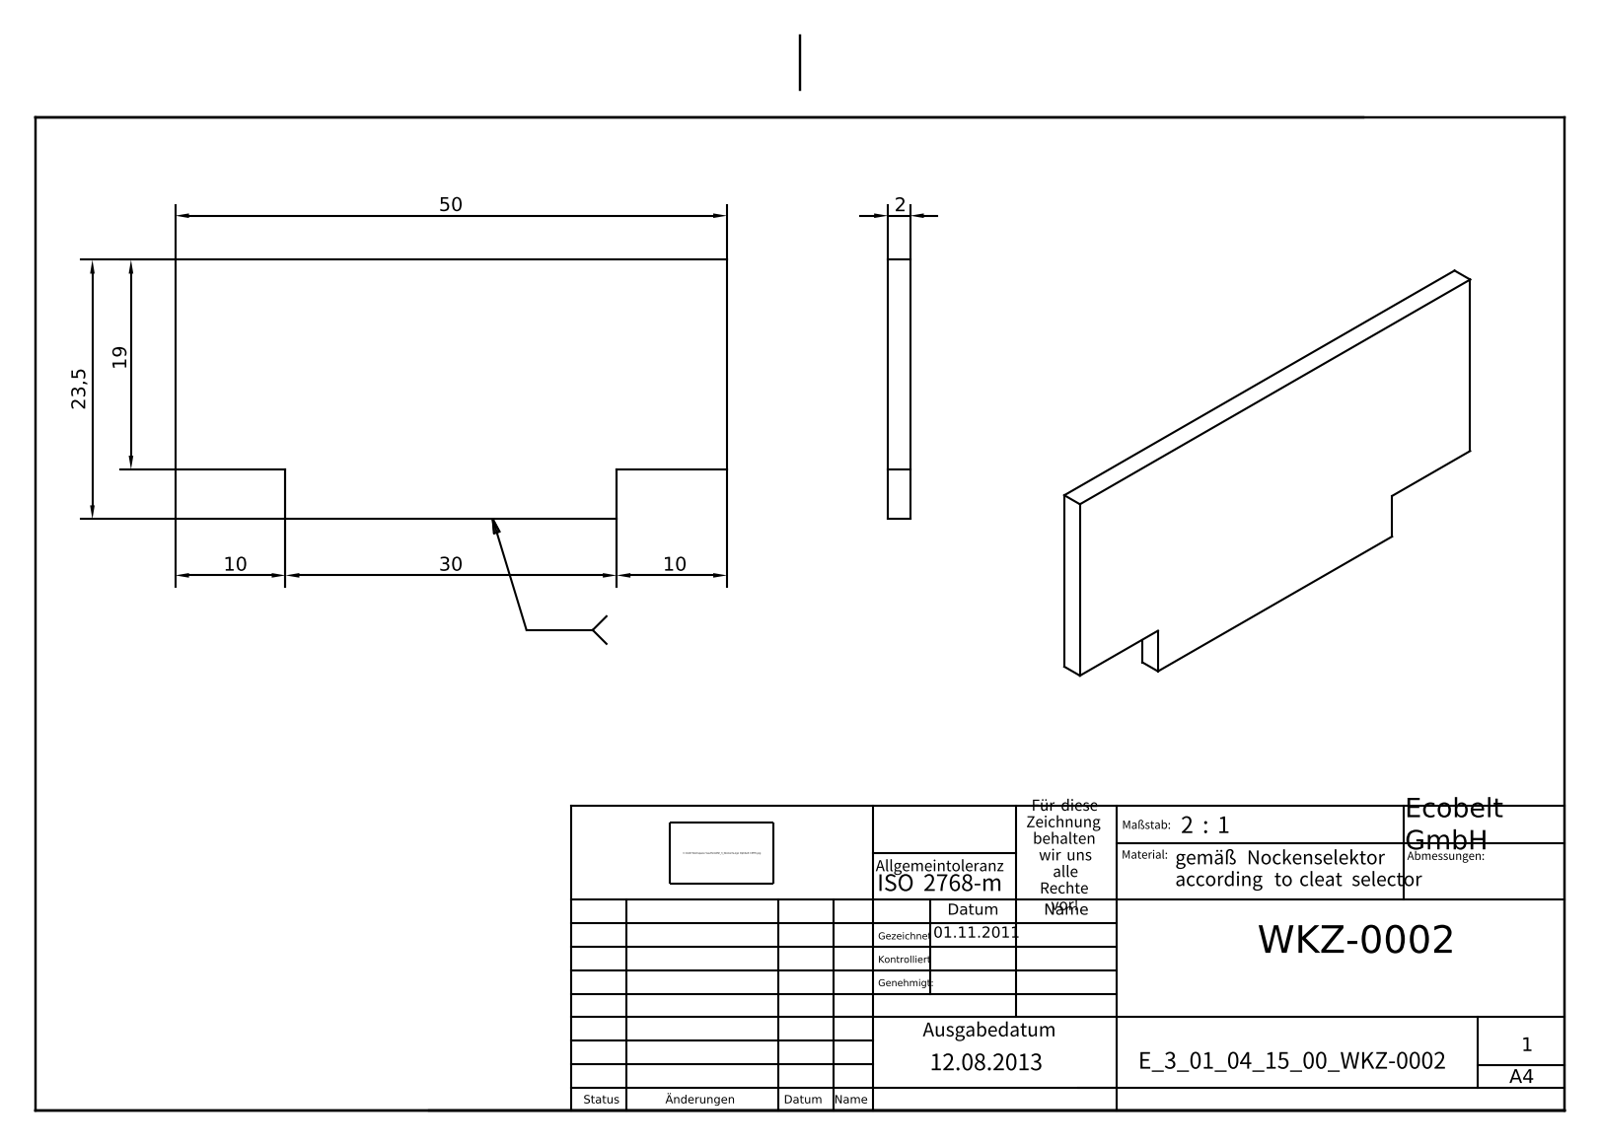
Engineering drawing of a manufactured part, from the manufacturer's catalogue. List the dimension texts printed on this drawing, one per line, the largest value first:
50
30
23,5
19
10
10
2
